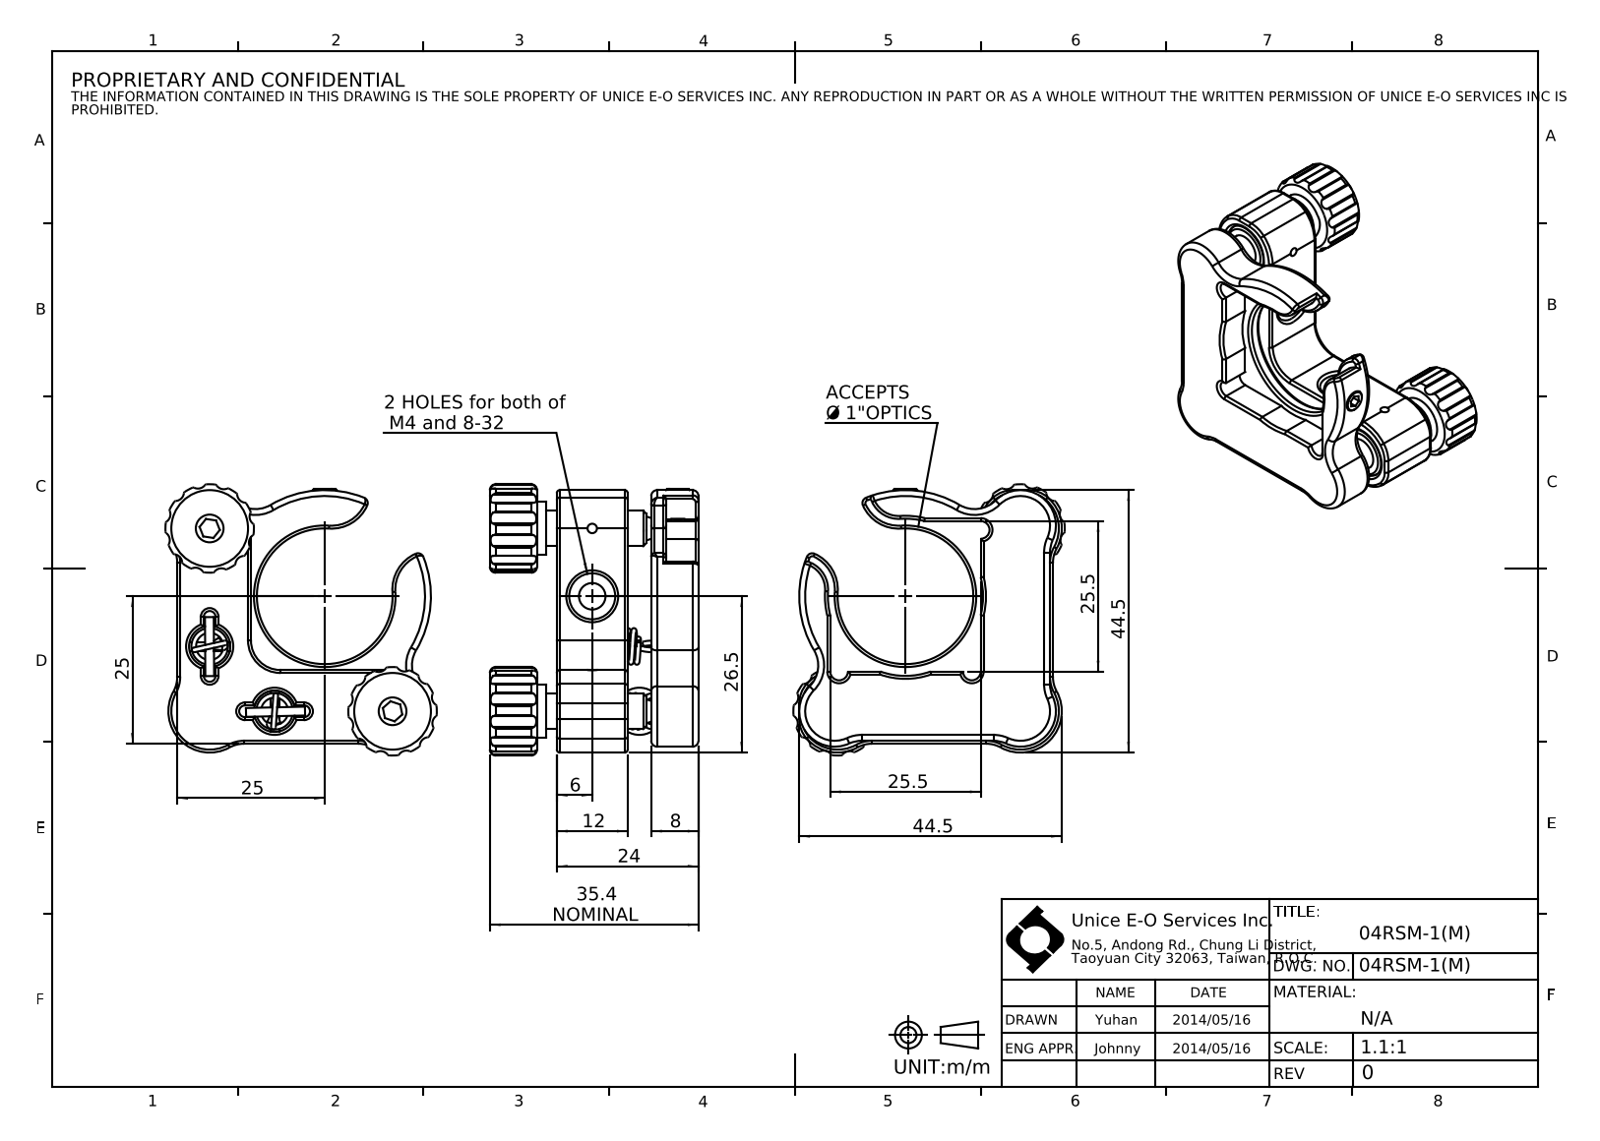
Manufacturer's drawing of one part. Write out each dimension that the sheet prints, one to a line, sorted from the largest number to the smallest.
44.5
44.5
35.4 NOMINAL
26.5
25.5
25.5
25
25
24
12
8
6
2 HOLES for both of M4 and 8-32
ACCEPTS Ø 1"OPTICS
